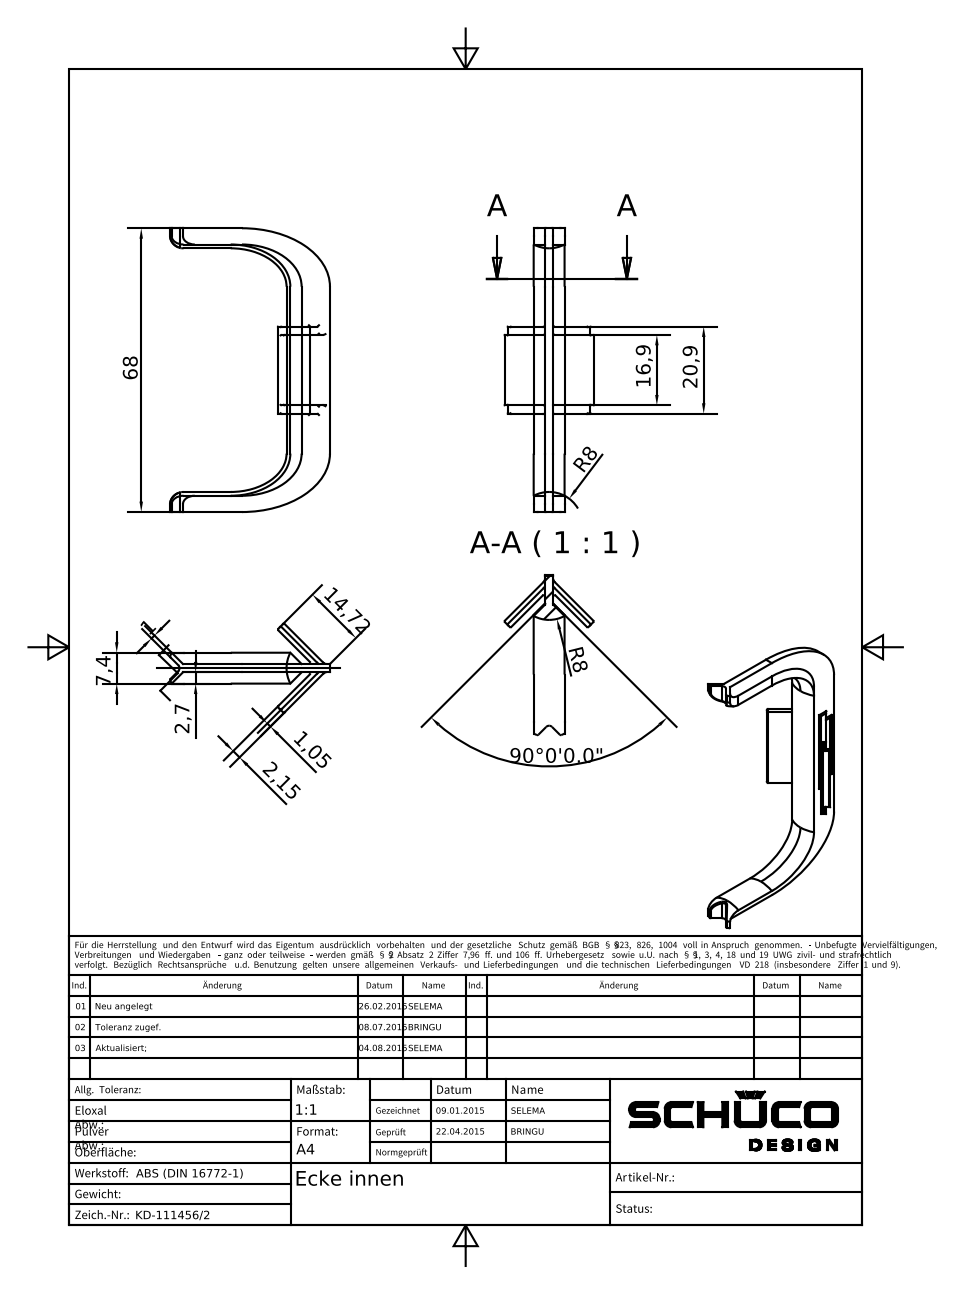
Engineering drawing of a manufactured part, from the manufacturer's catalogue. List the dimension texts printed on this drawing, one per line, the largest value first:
90°0'0.0"
68
20,9
16,9
14,72
R8
R8
7,4
2,7
2,15
1,05
1
